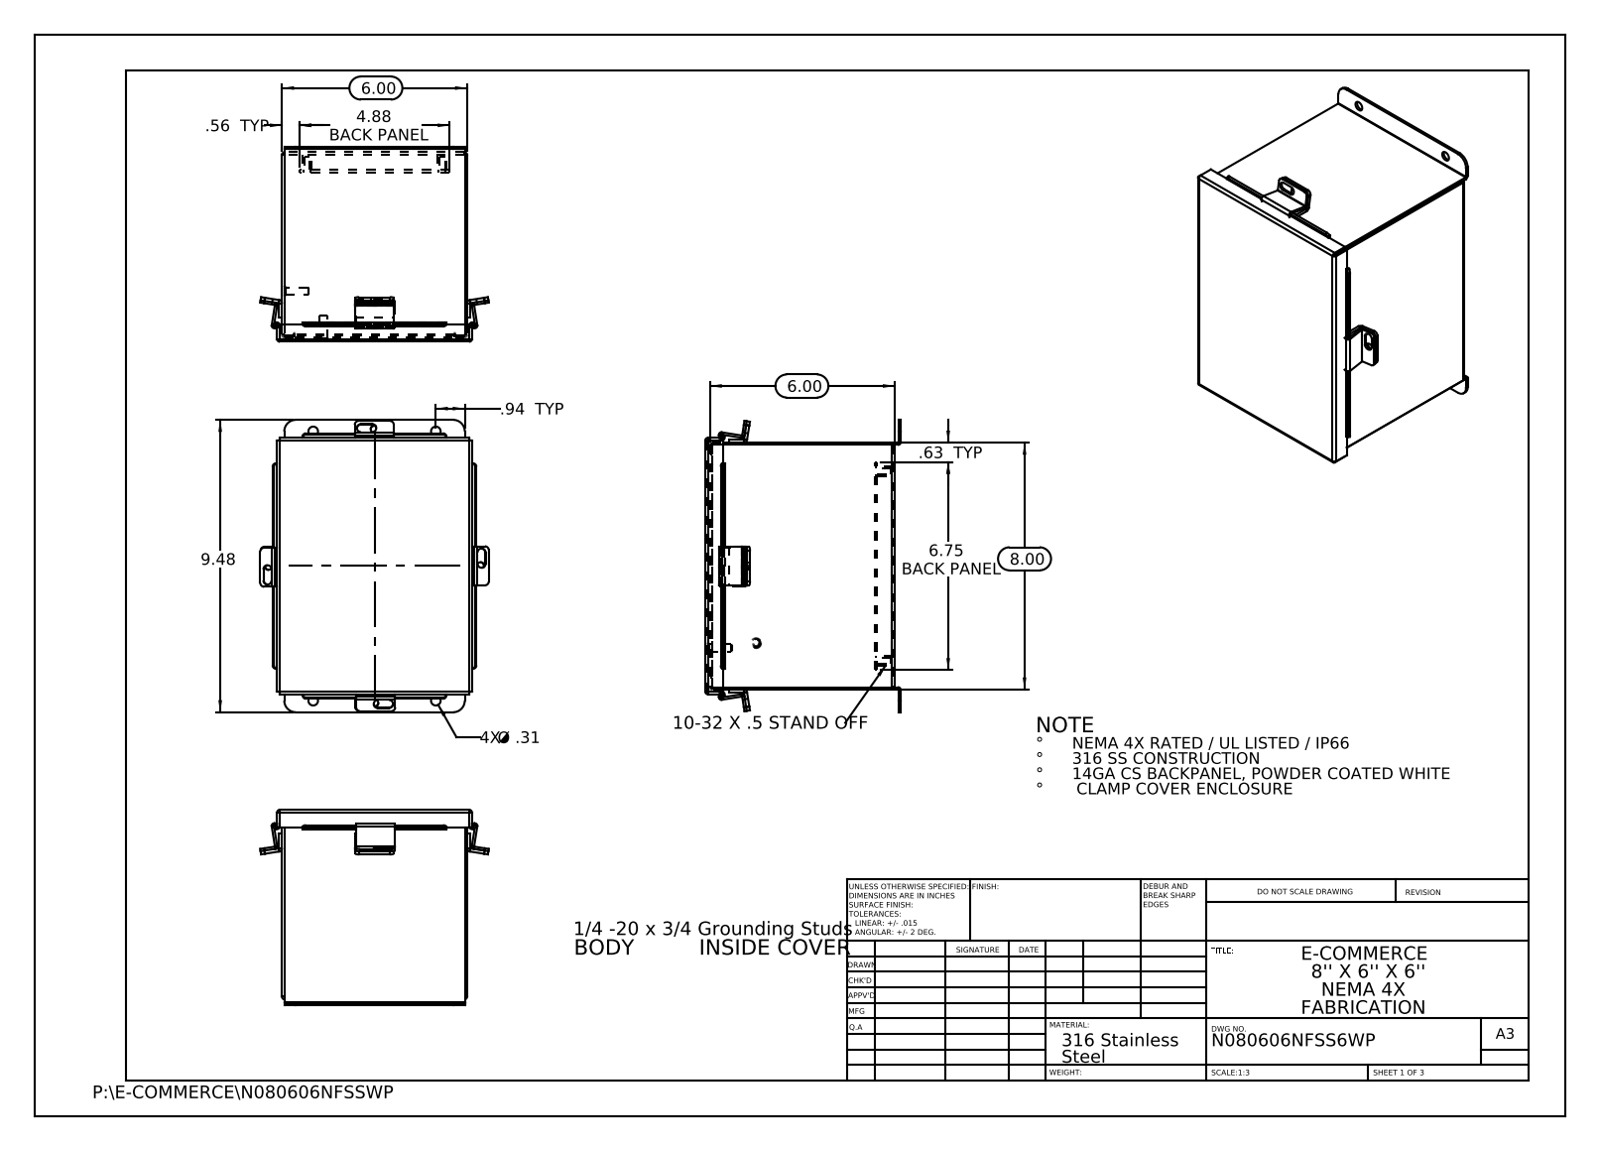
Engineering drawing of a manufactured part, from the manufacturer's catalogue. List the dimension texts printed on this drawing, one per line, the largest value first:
9.48
8.00
6.75 BACK PANEL
6.00
6.00
4.88 BACK PANEL
.94 TYP
.63 TYP
.56 TYP
4X Ø .31
